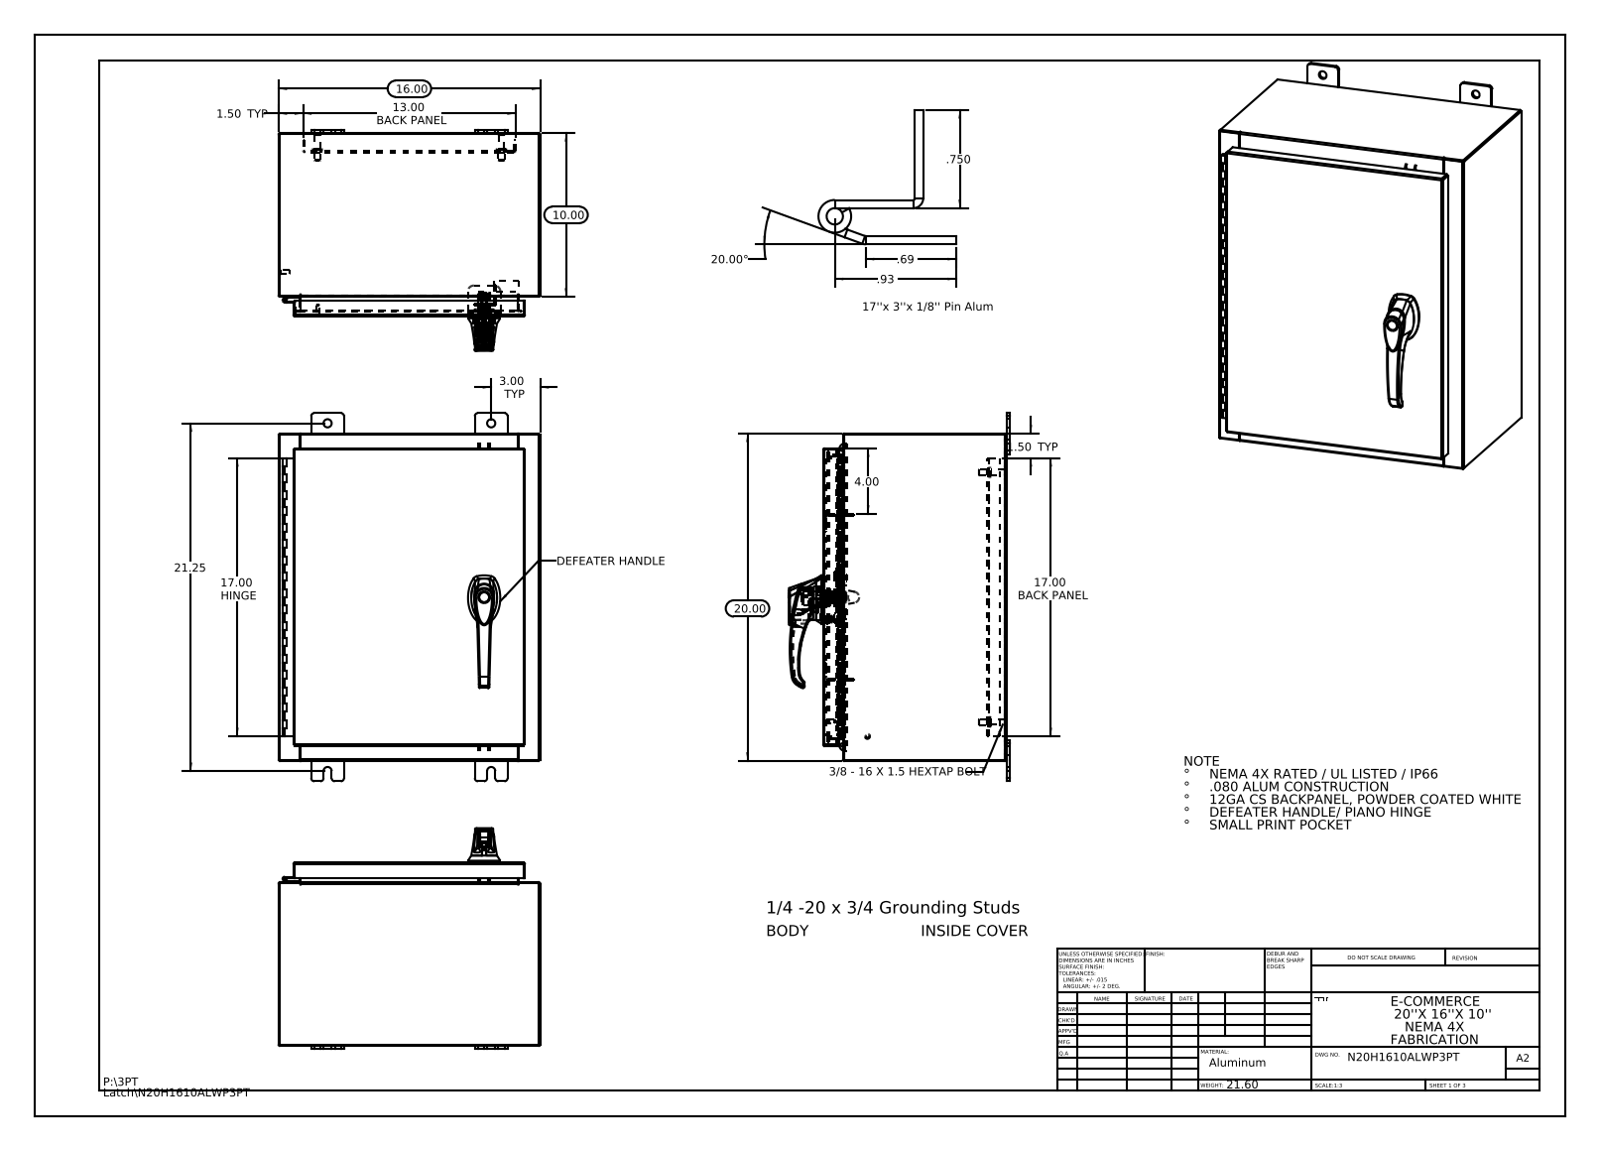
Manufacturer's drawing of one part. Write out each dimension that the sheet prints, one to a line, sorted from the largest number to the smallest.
21.25
20.00
20.00°
17.00 HINGE
17.00 BACK PANEL
16.00
13.00 BACK PANEL
10.00
4.00
3.00 TYP
1.50 TYP
1.50 TYP
.93
.750
.69
